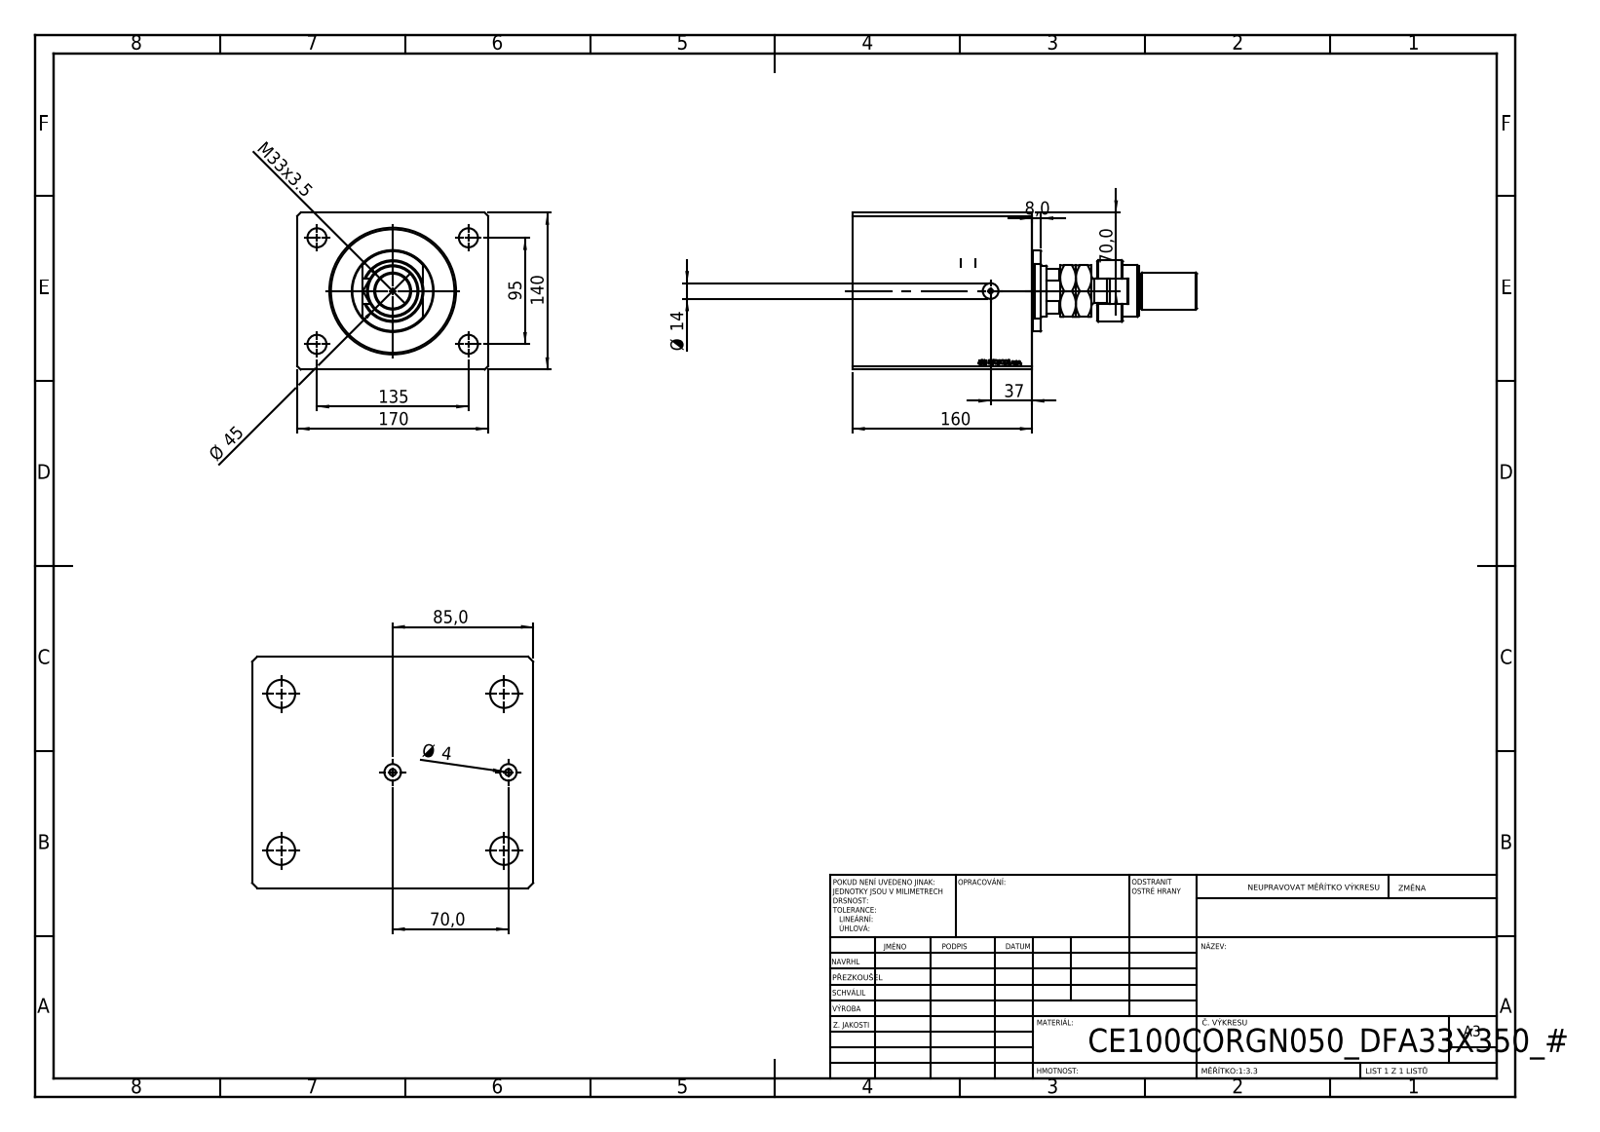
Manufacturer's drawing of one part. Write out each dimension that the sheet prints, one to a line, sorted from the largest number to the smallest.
170
160
140
135
95
85,0
70,0
70,0
Ø 45
37
M33x3.5
Ø 14
8,0
Ø 4
